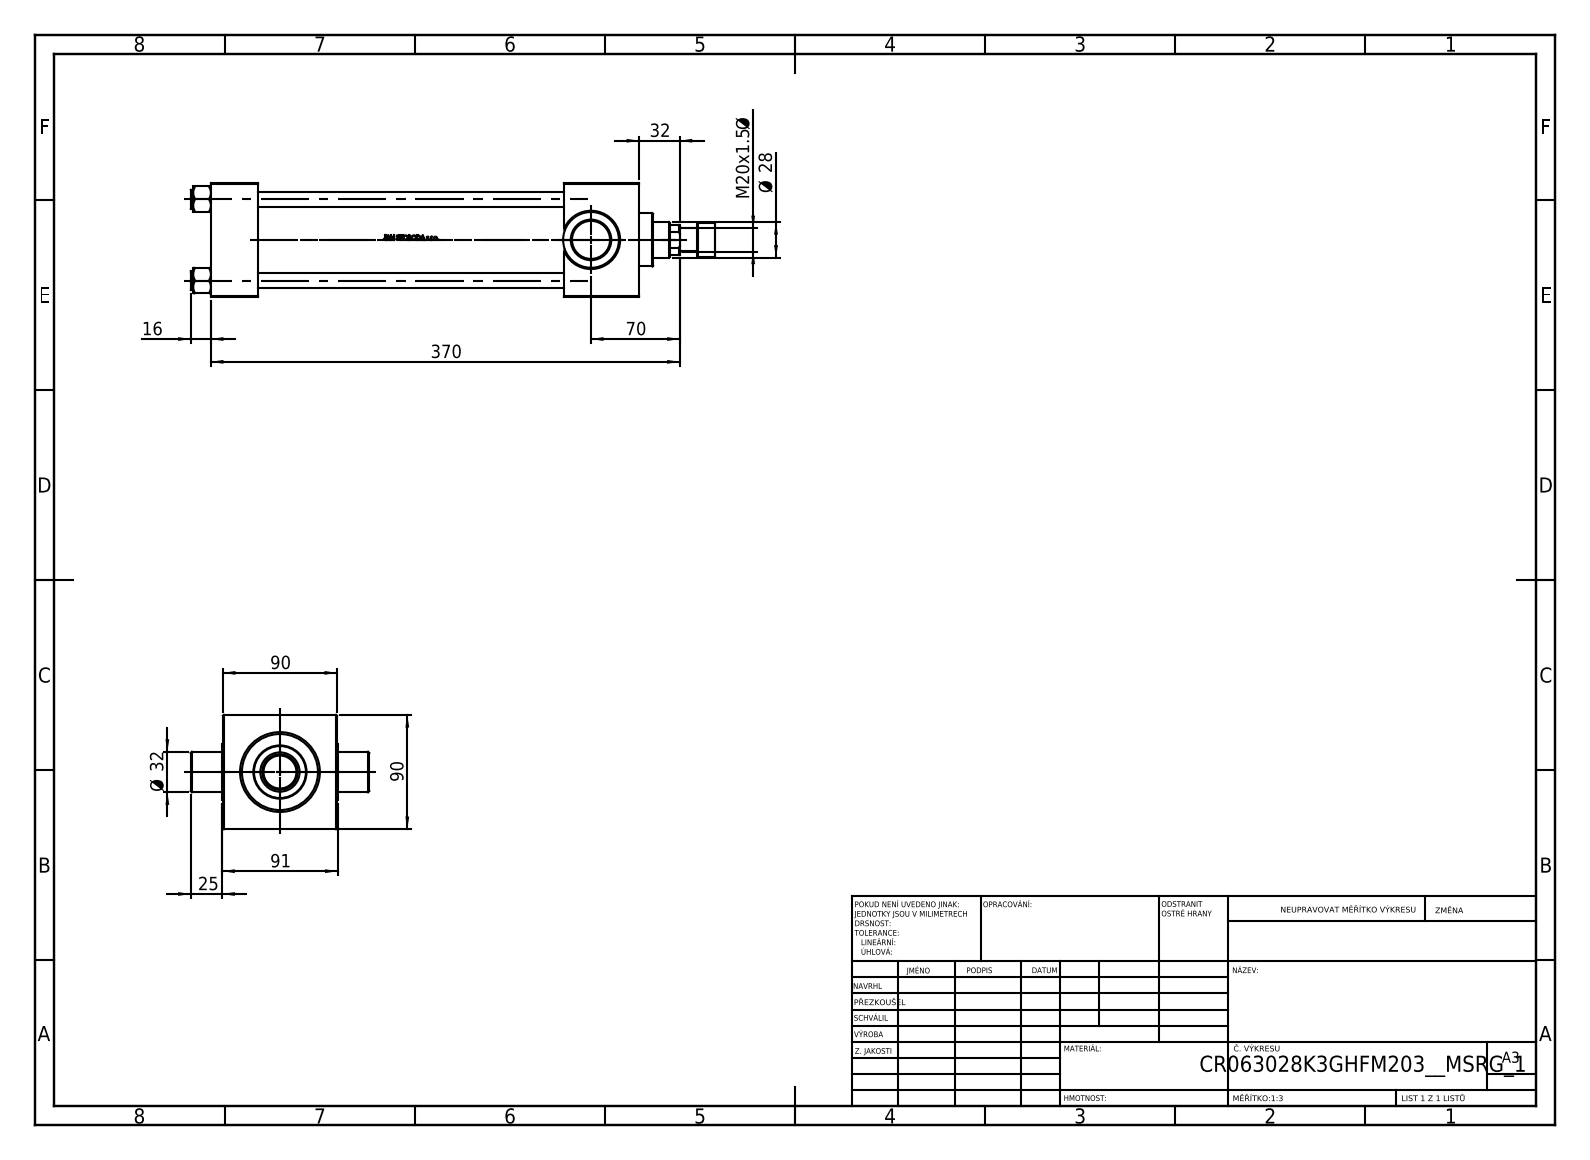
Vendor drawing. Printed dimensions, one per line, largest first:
370
91
90
90
70
32
Ø 32
Ø 28
25
M20x1.5 Ø
16
